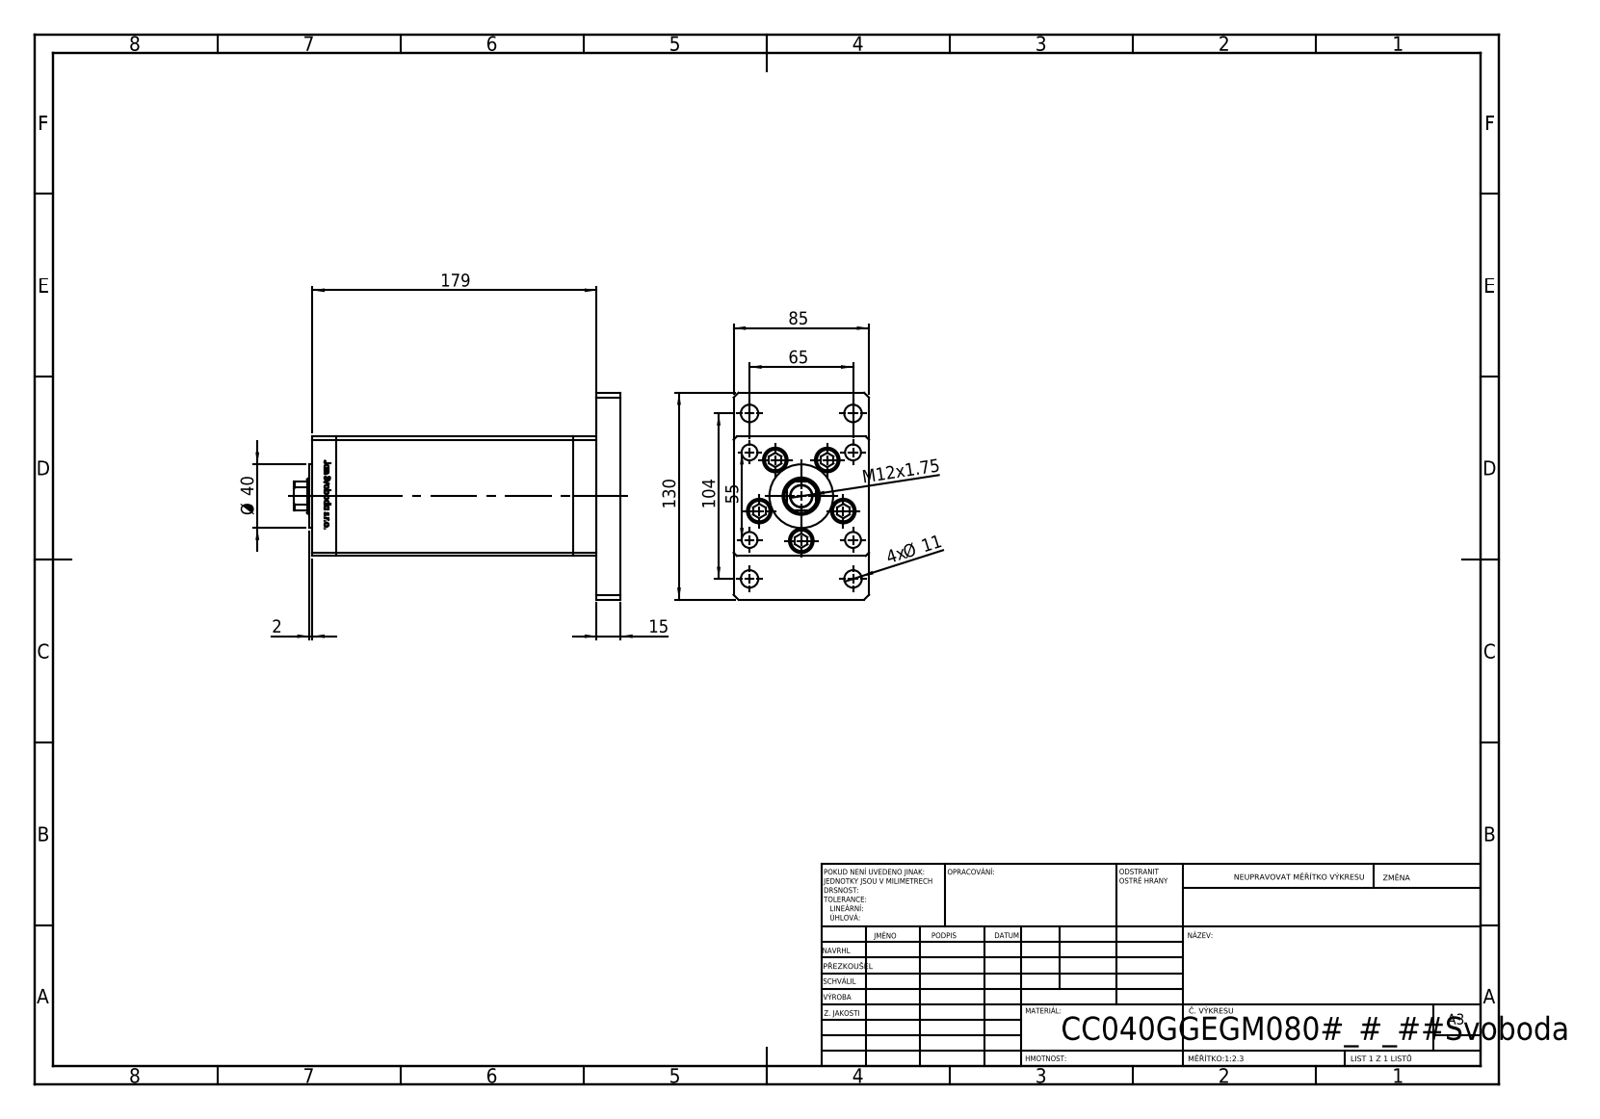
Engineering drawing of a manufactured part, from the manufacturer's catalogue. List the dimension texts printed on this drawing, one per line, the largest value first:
179
130
104
85
65
55
Ø 40
15
M12x1.75
4x Ø 11
2
